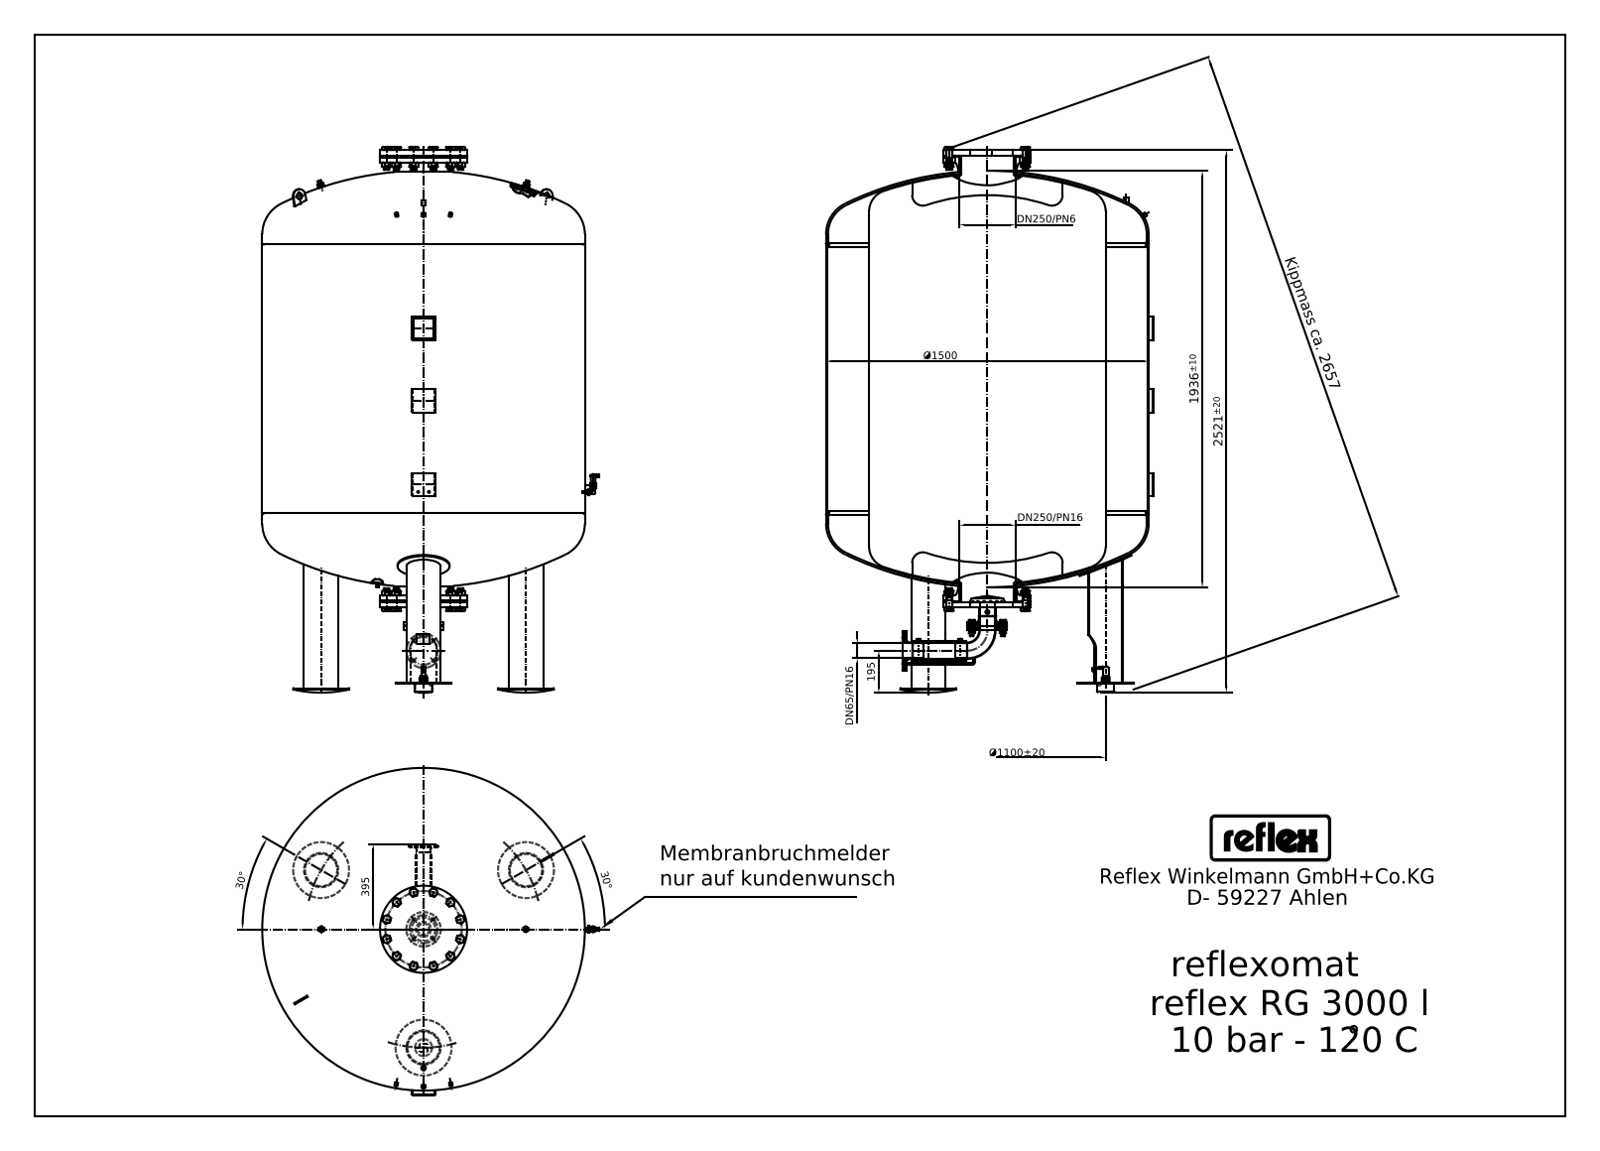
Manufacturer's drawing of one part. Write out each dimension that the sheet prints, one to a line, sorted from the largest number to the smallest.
Kippmass ca. 2657
2521±20
1936±10
Ø1500
Ø1100±20
395
DN250/PN6
DN250/PN16
195
DN65/PN16
30°
30°
